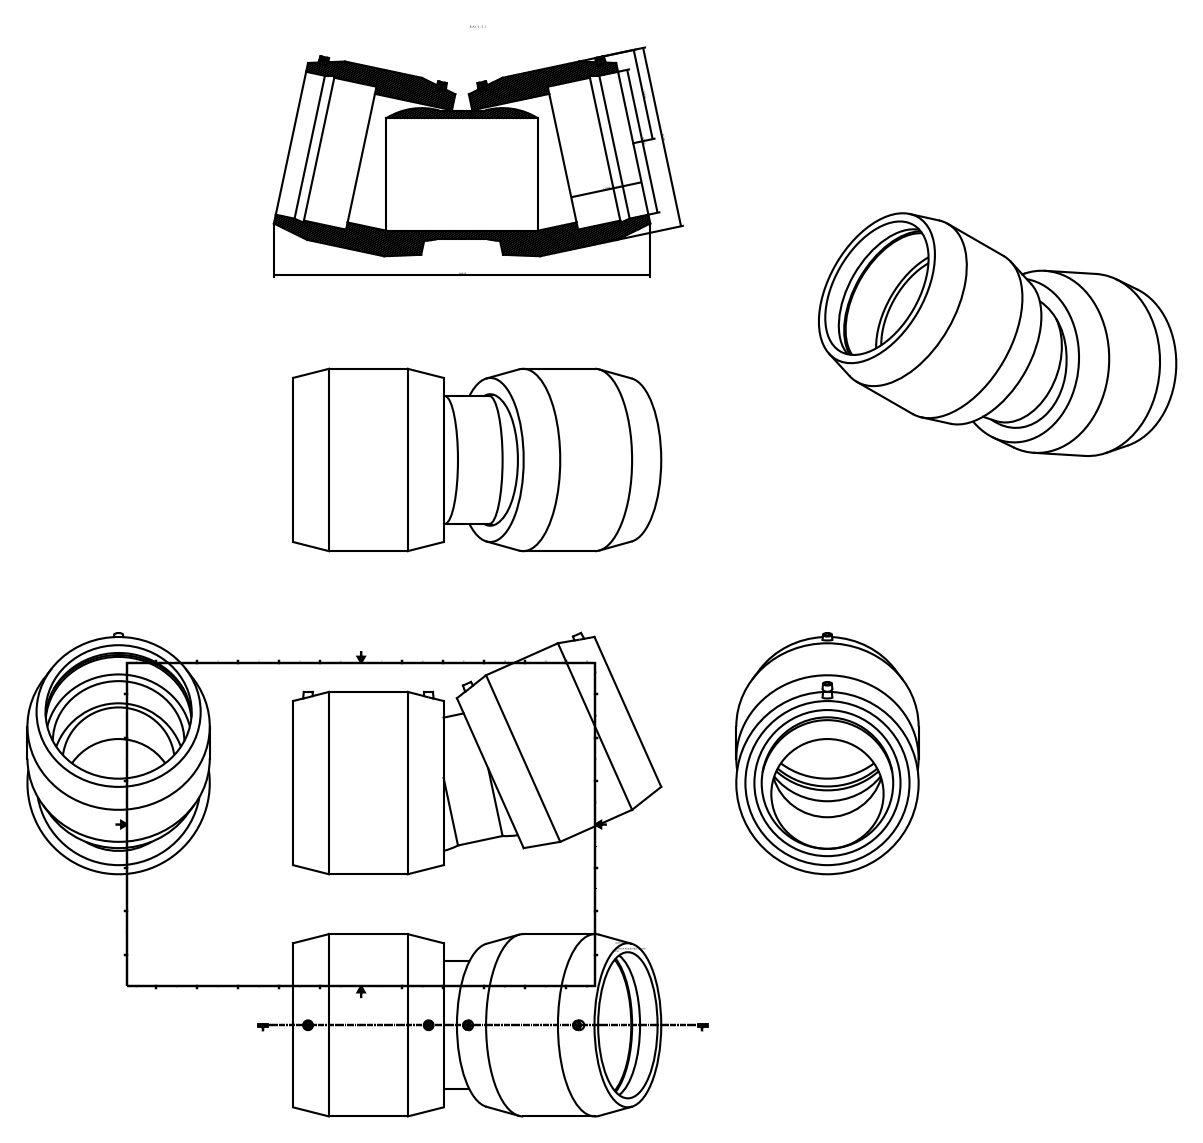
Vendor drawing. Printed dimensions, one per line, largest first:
644,00
312,00
n250,00
156,00
123,00
